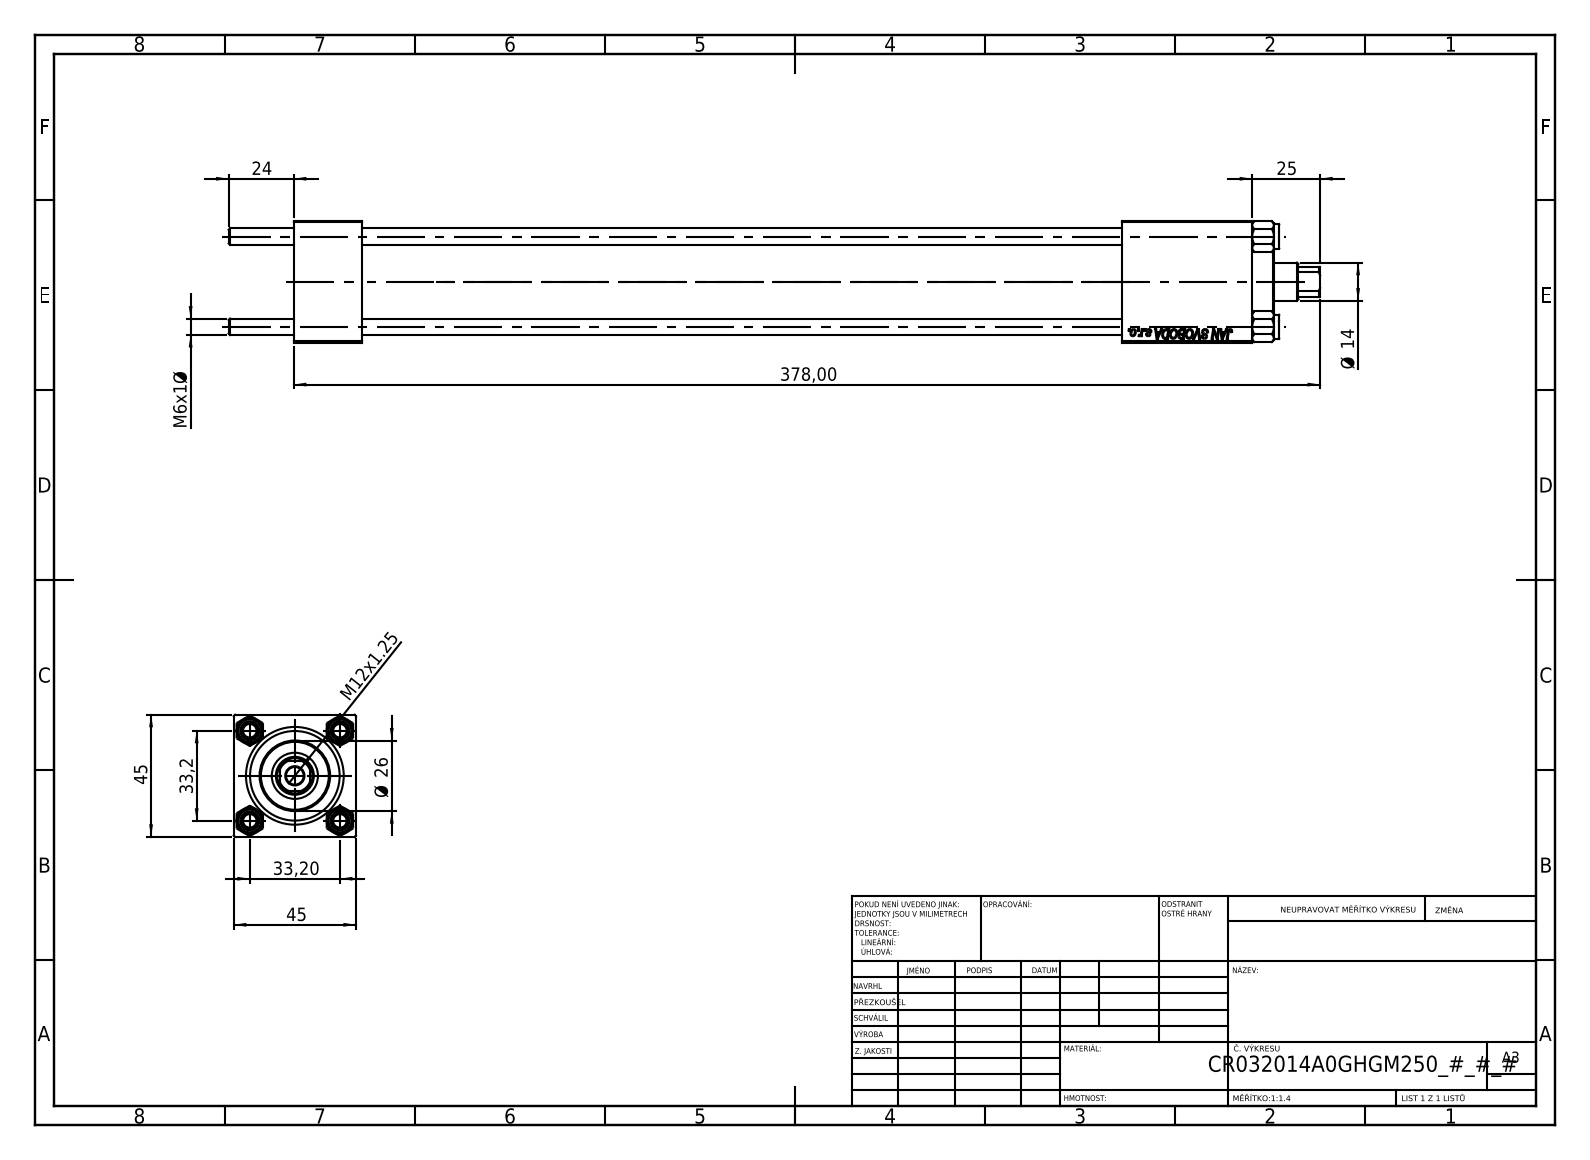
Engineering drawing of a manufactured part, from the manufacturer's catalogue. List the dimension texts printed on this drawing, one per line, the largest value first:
378,00
45
45
33,2
33,20
Ø 26
25
24
Ø 14
M12x1.25
M6x1 Ø
